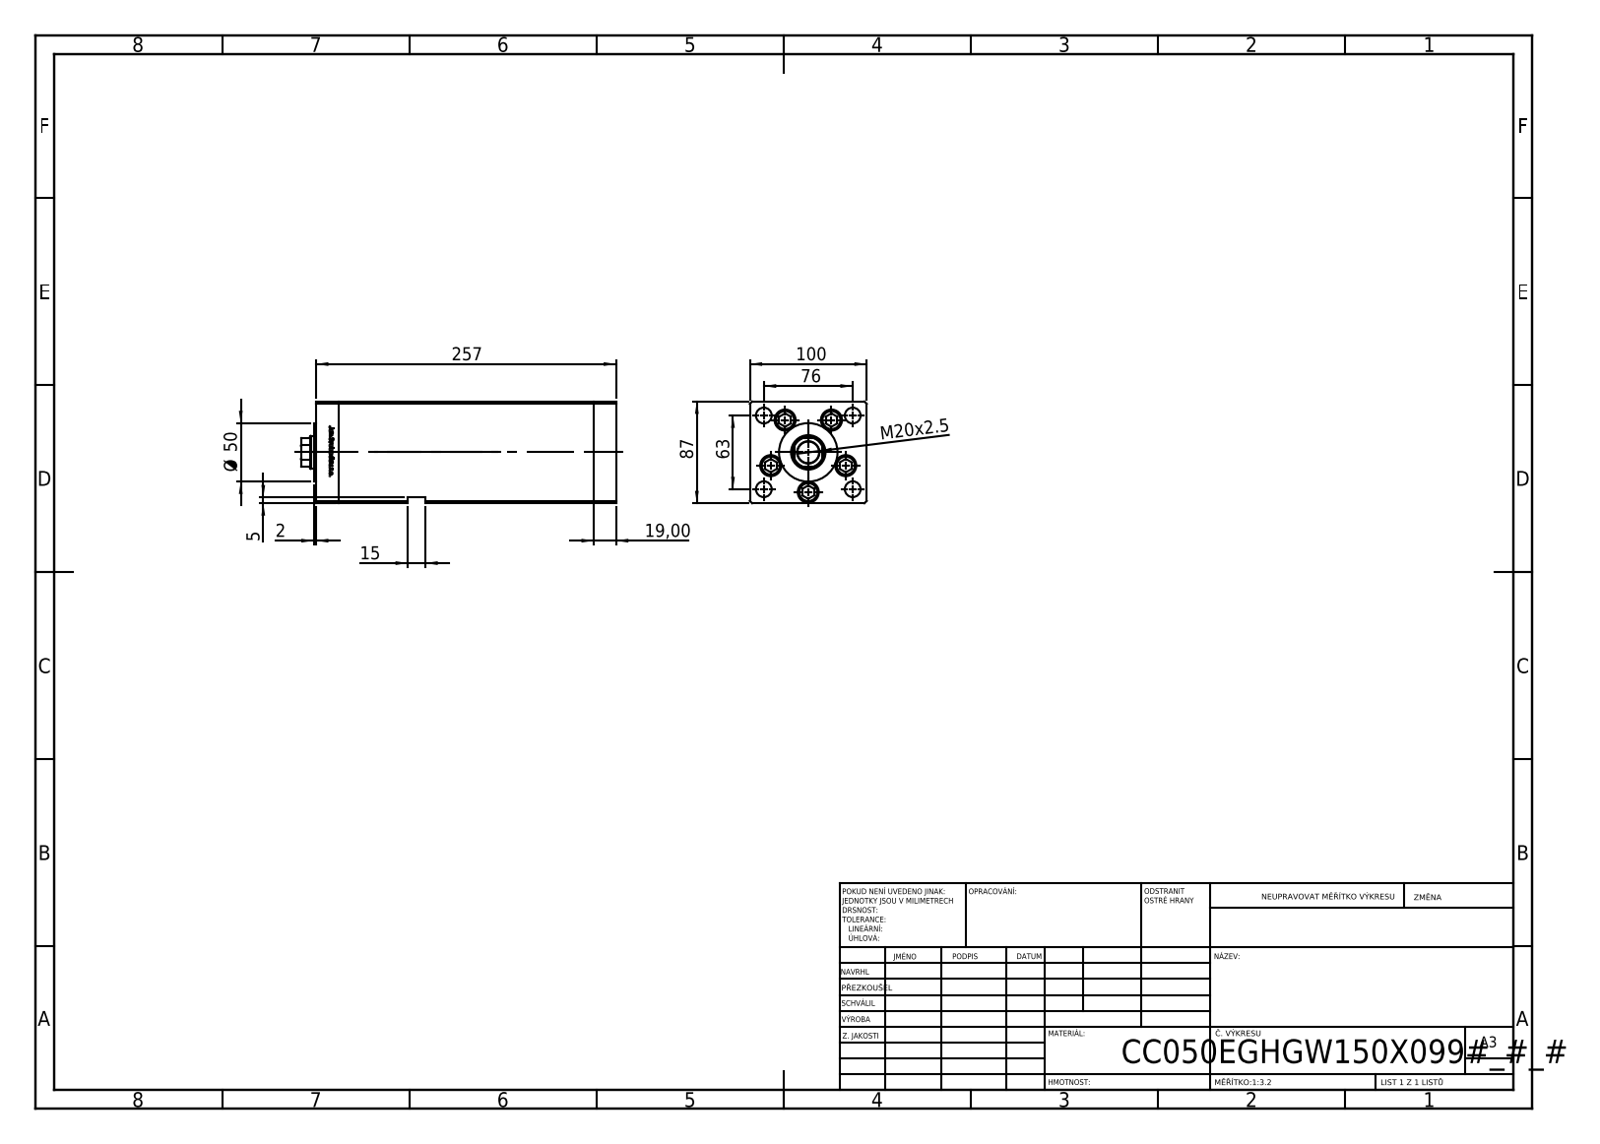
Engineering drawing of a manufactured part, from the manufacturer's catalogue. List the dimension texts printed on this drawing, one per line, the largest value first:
257
100
87
76
63
Ø 50
M20x2.5
19,00
15
5
2
